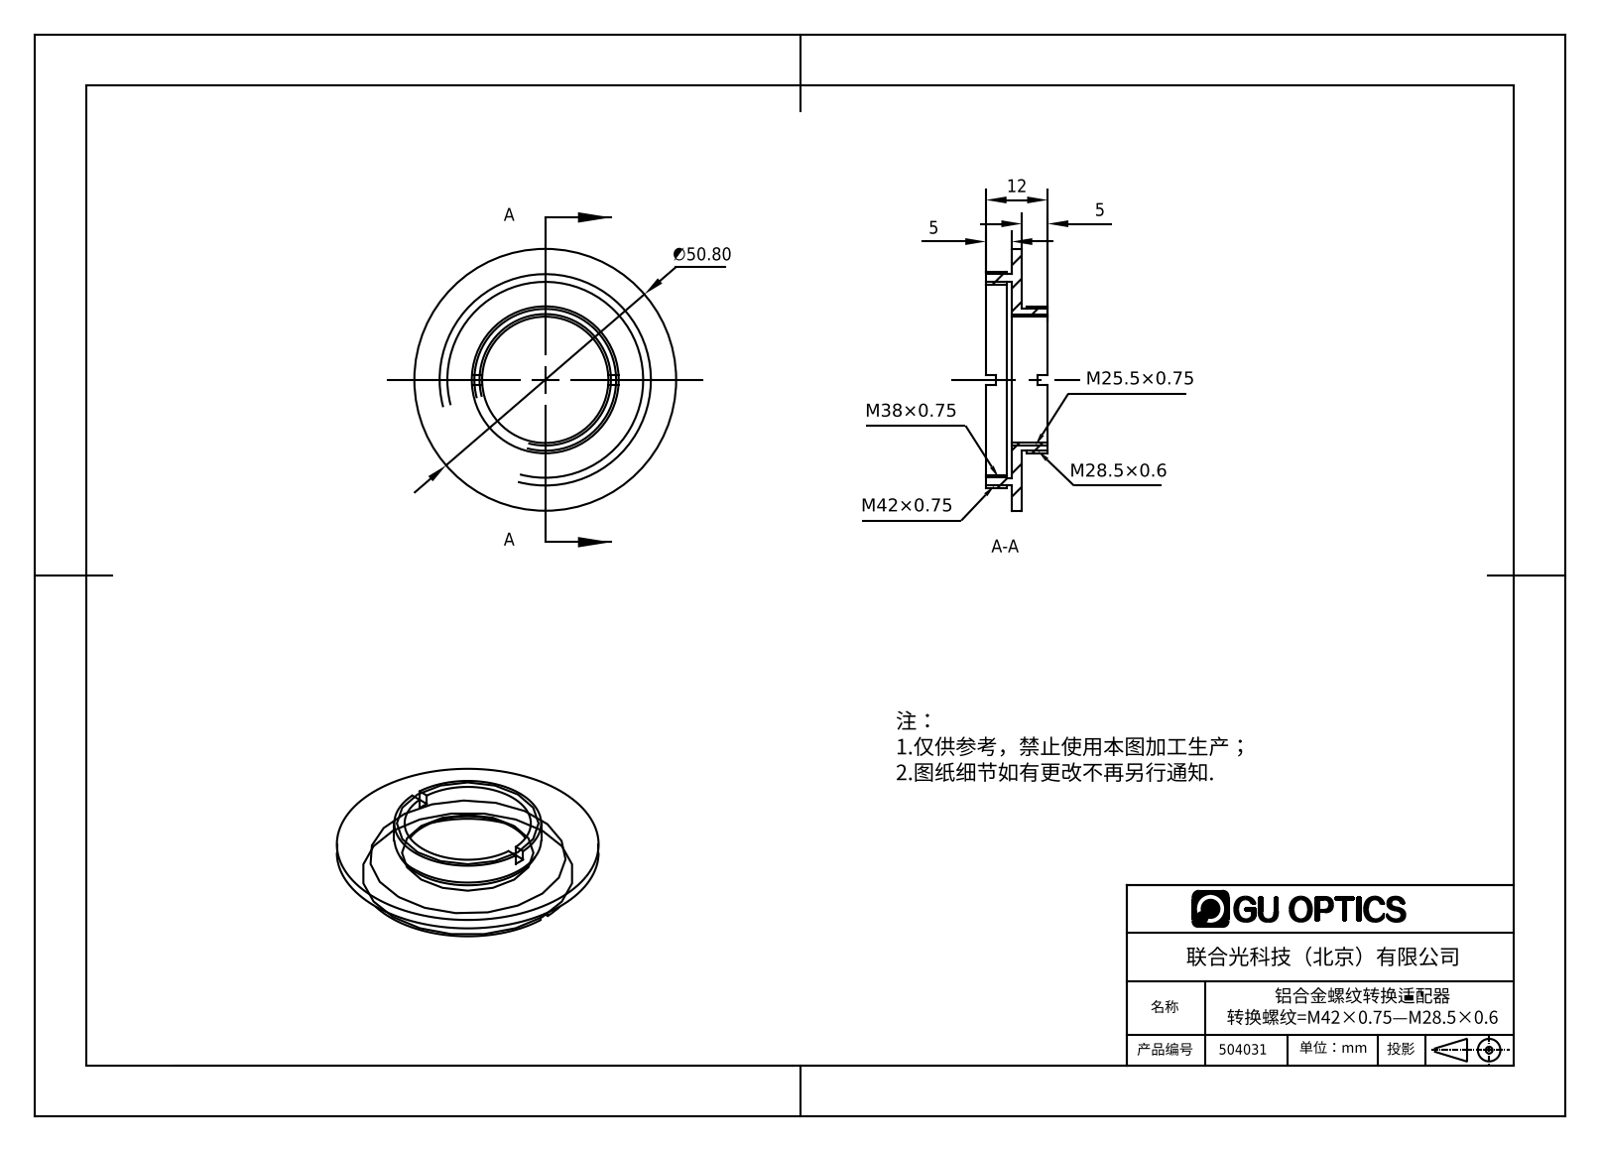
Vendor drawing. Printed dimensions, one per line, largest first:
∅50.80
12
5
5
